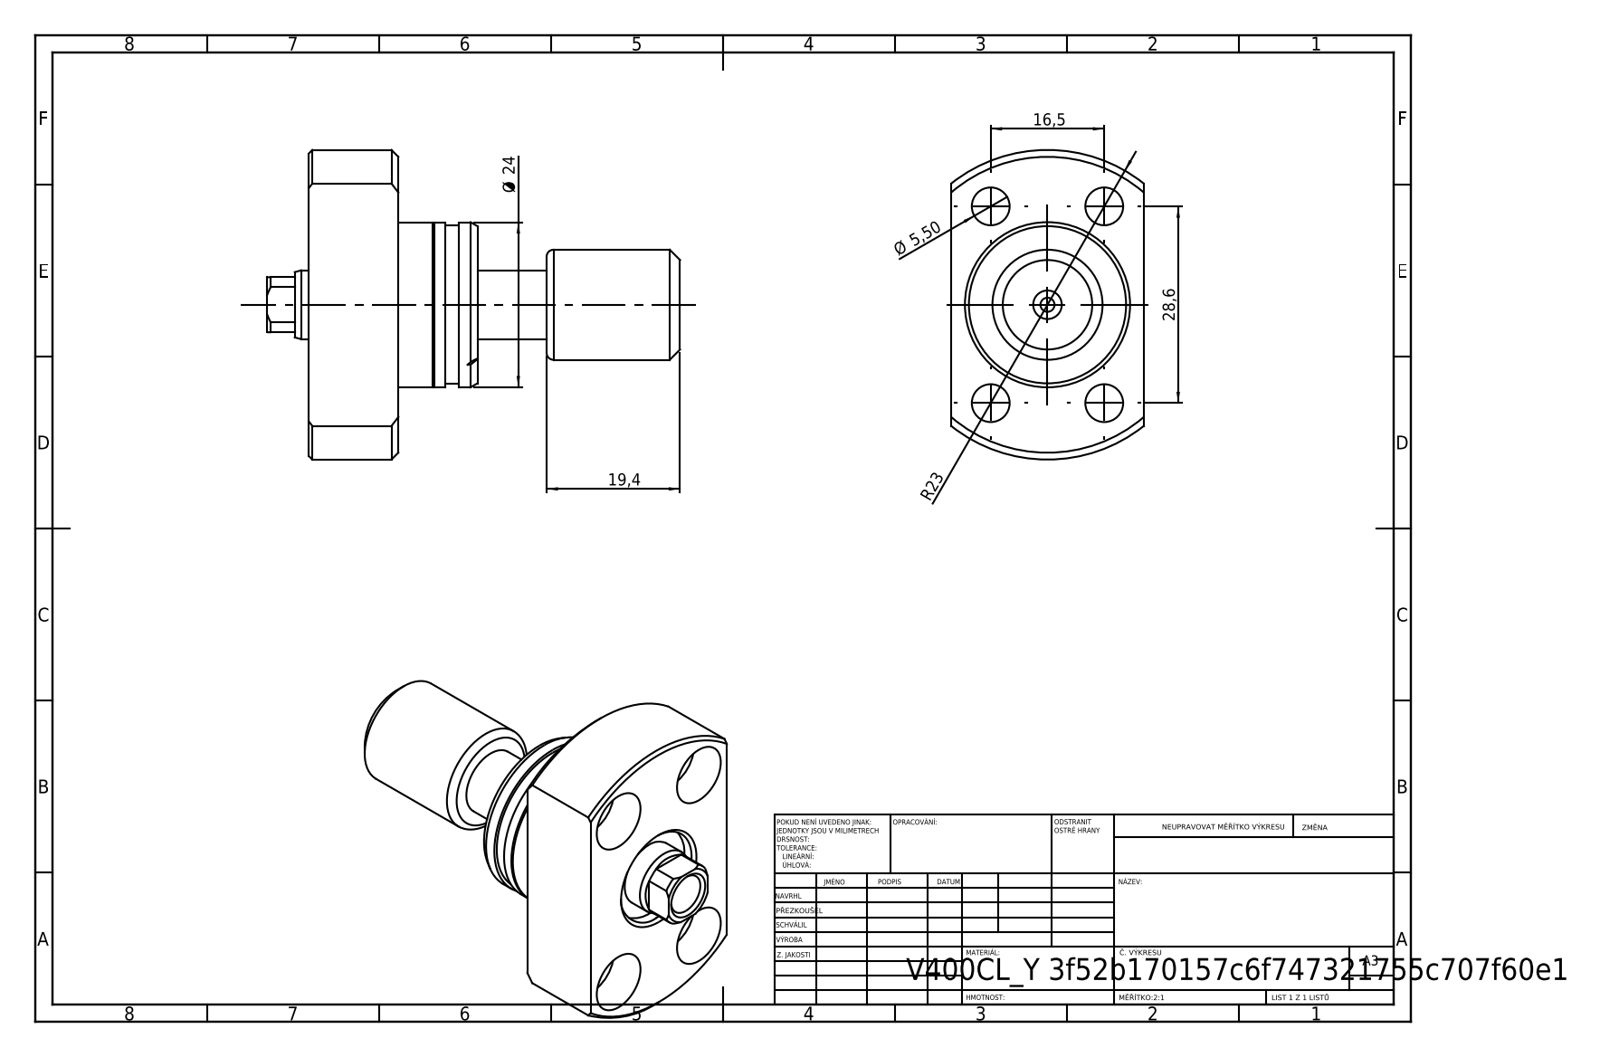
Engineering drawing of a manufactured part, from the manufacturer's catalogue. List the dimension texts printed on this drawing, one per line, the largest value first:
28,6
Ø 24
R23
19,4
16,5
Ø 5,50
